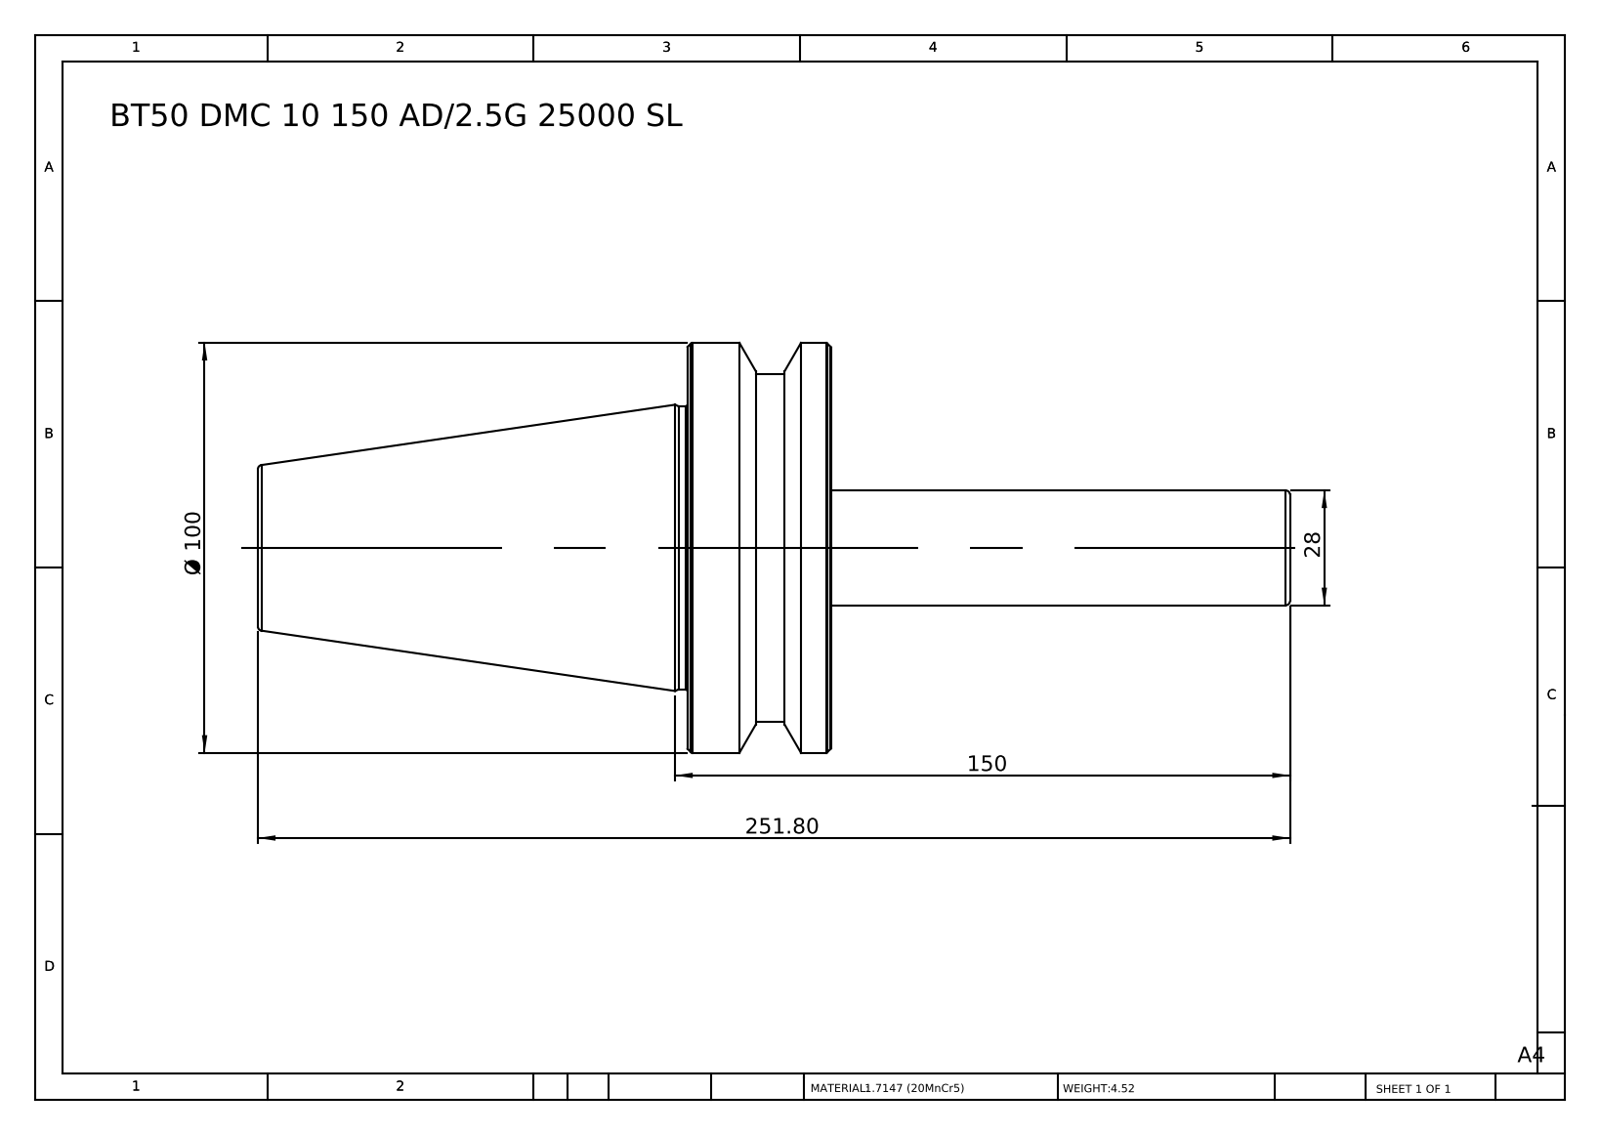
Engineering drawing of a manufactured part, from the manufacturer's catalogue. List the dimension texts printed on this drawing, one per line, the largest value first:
251.80
150
Ø 100
28
